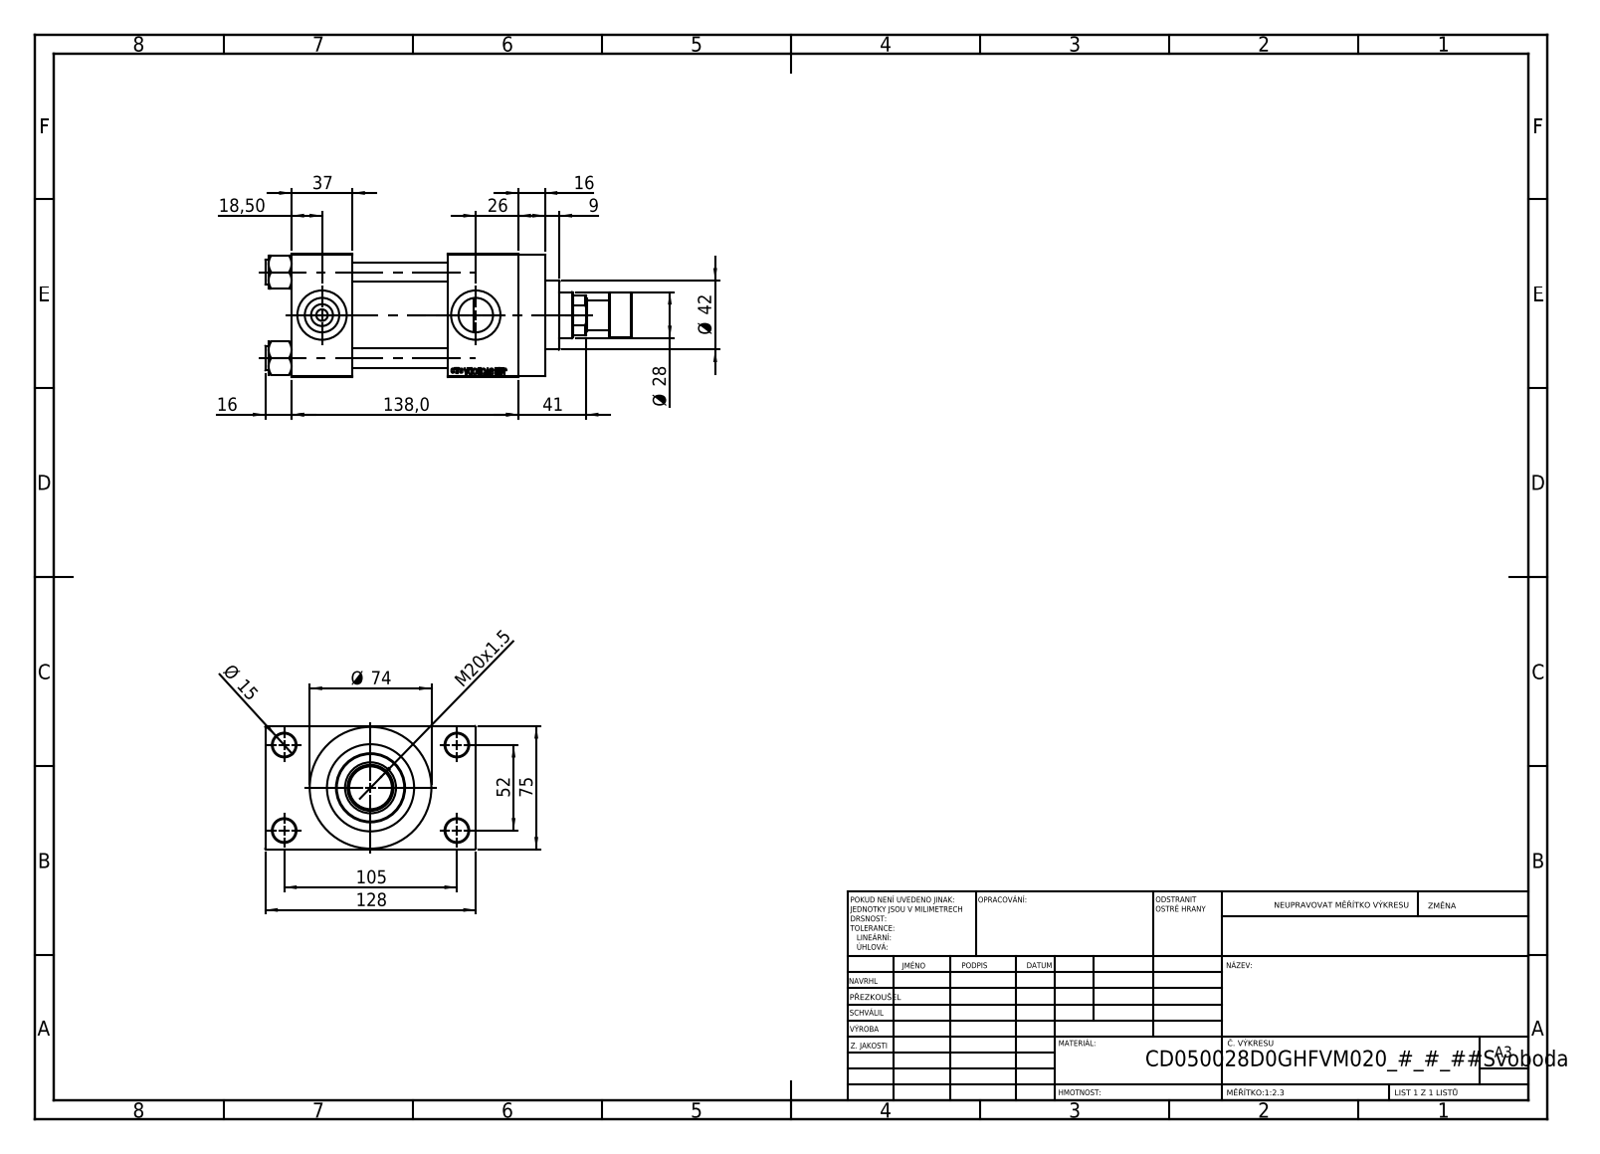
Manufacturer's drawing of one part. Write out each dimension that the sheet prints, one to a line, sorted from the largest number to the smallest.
138,0
128
105
75
Ø 74
52
Ø 42
41
37
Ø 28
26
M20x1.5
18,50
16
16
Ø 15
9
